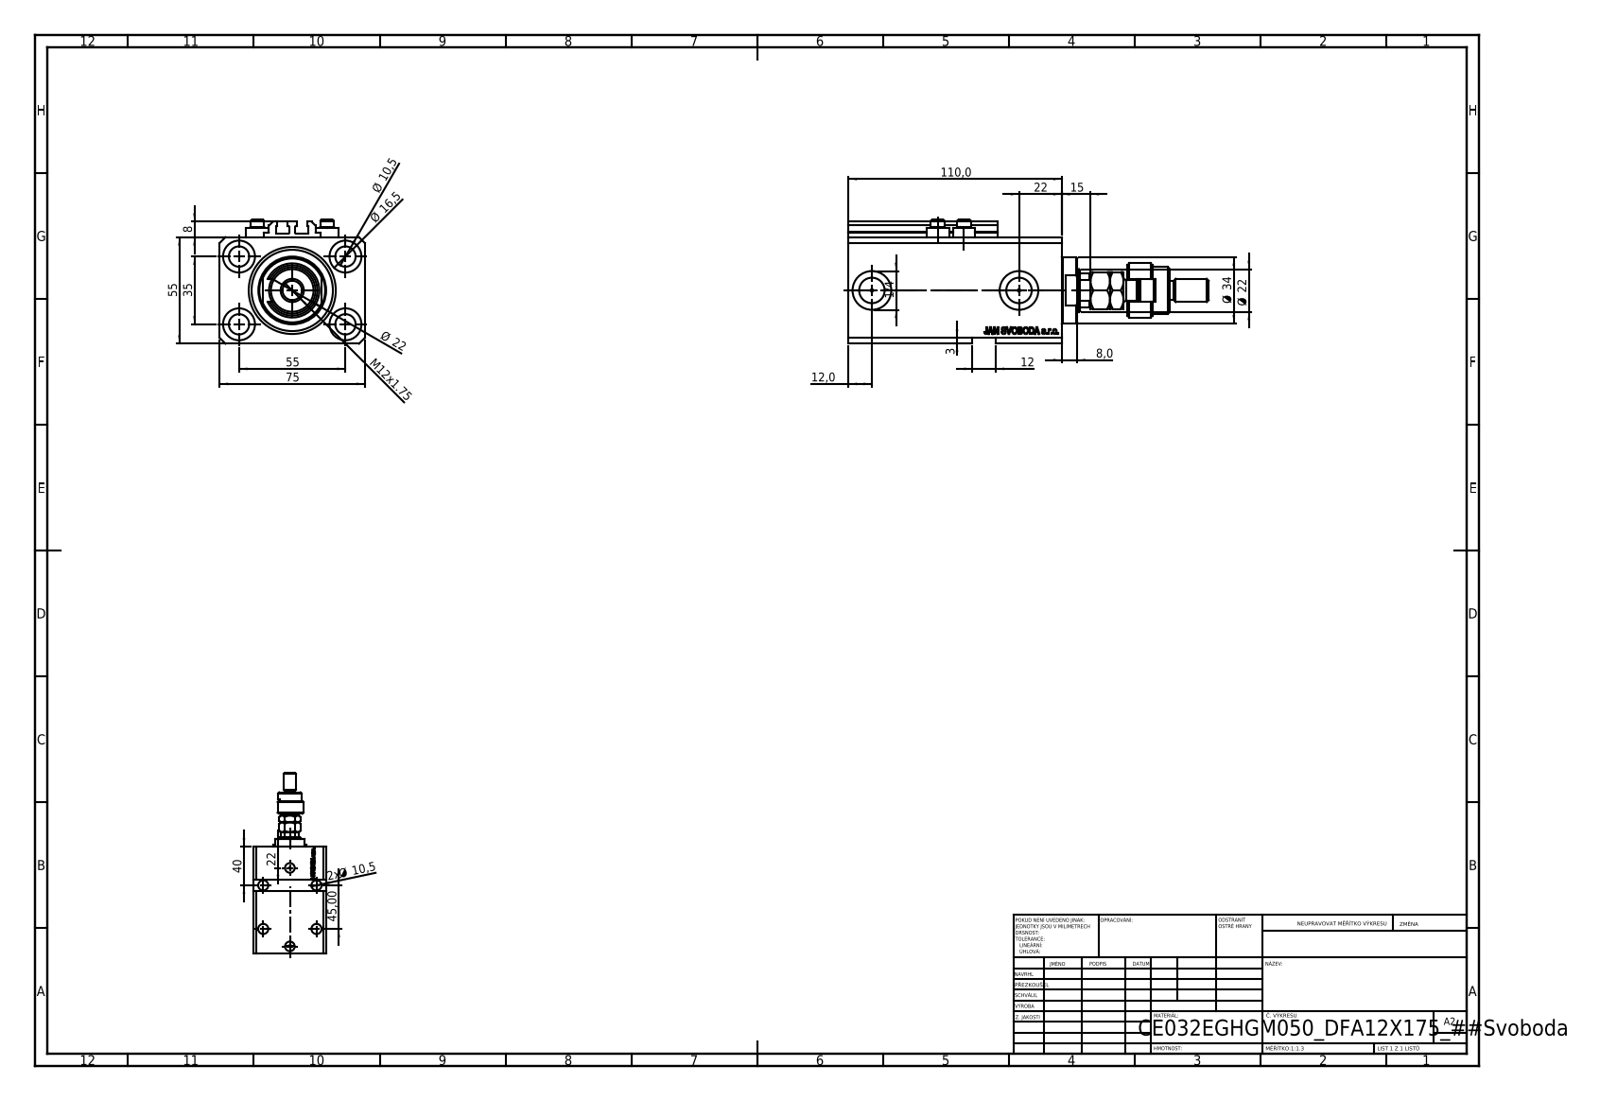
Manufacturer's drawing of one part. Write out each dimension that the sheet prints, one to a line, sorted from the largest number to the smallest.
110,0
75
55
55
45,00
40
35
Ø 34
Ø 22
22
Ø 22
22
Ø 16,5
15
M12x1.75
12,0
12
Ø 10,5
2x Ø 10,5
8
8,0
3
1/4
